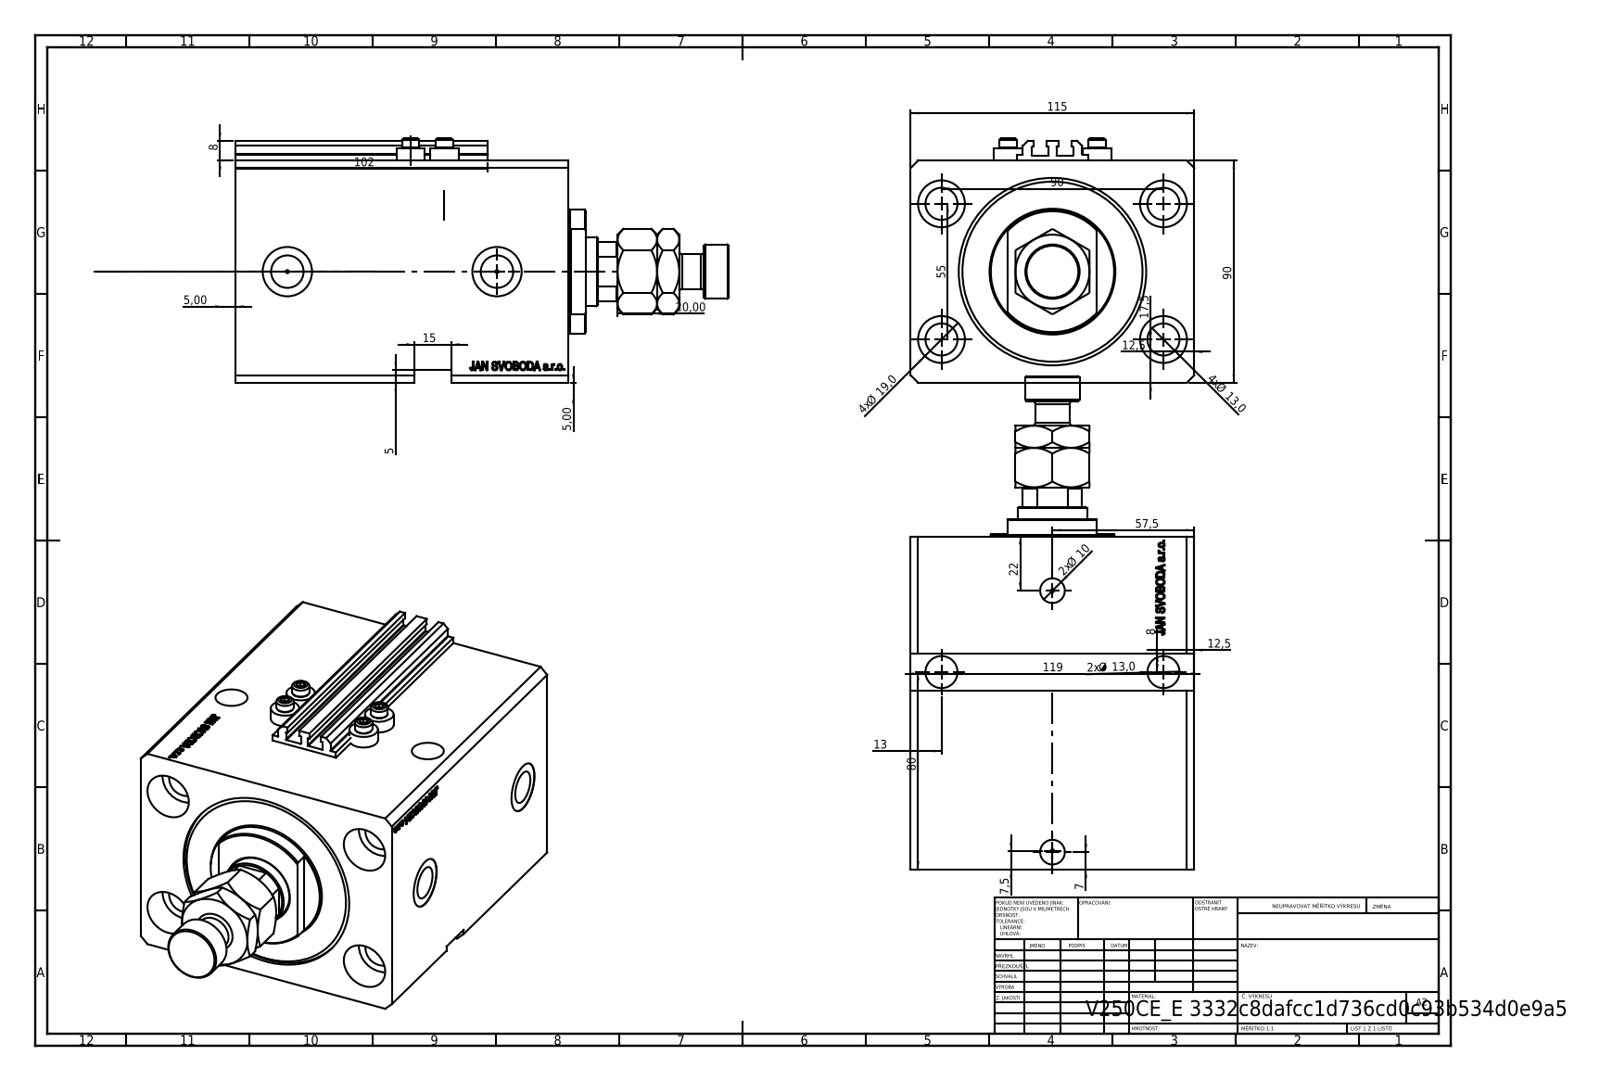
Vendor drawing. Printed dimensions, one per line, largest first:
119
115
102
90
90
80
57,5
55
22
20,00
4x Ø 19,0
17,5
15
4x Ø 13,0
2x Ø 13,0
13
12,5
12,5
2x Ø 10
8
8
7,5
7
5,00
5,00
5
